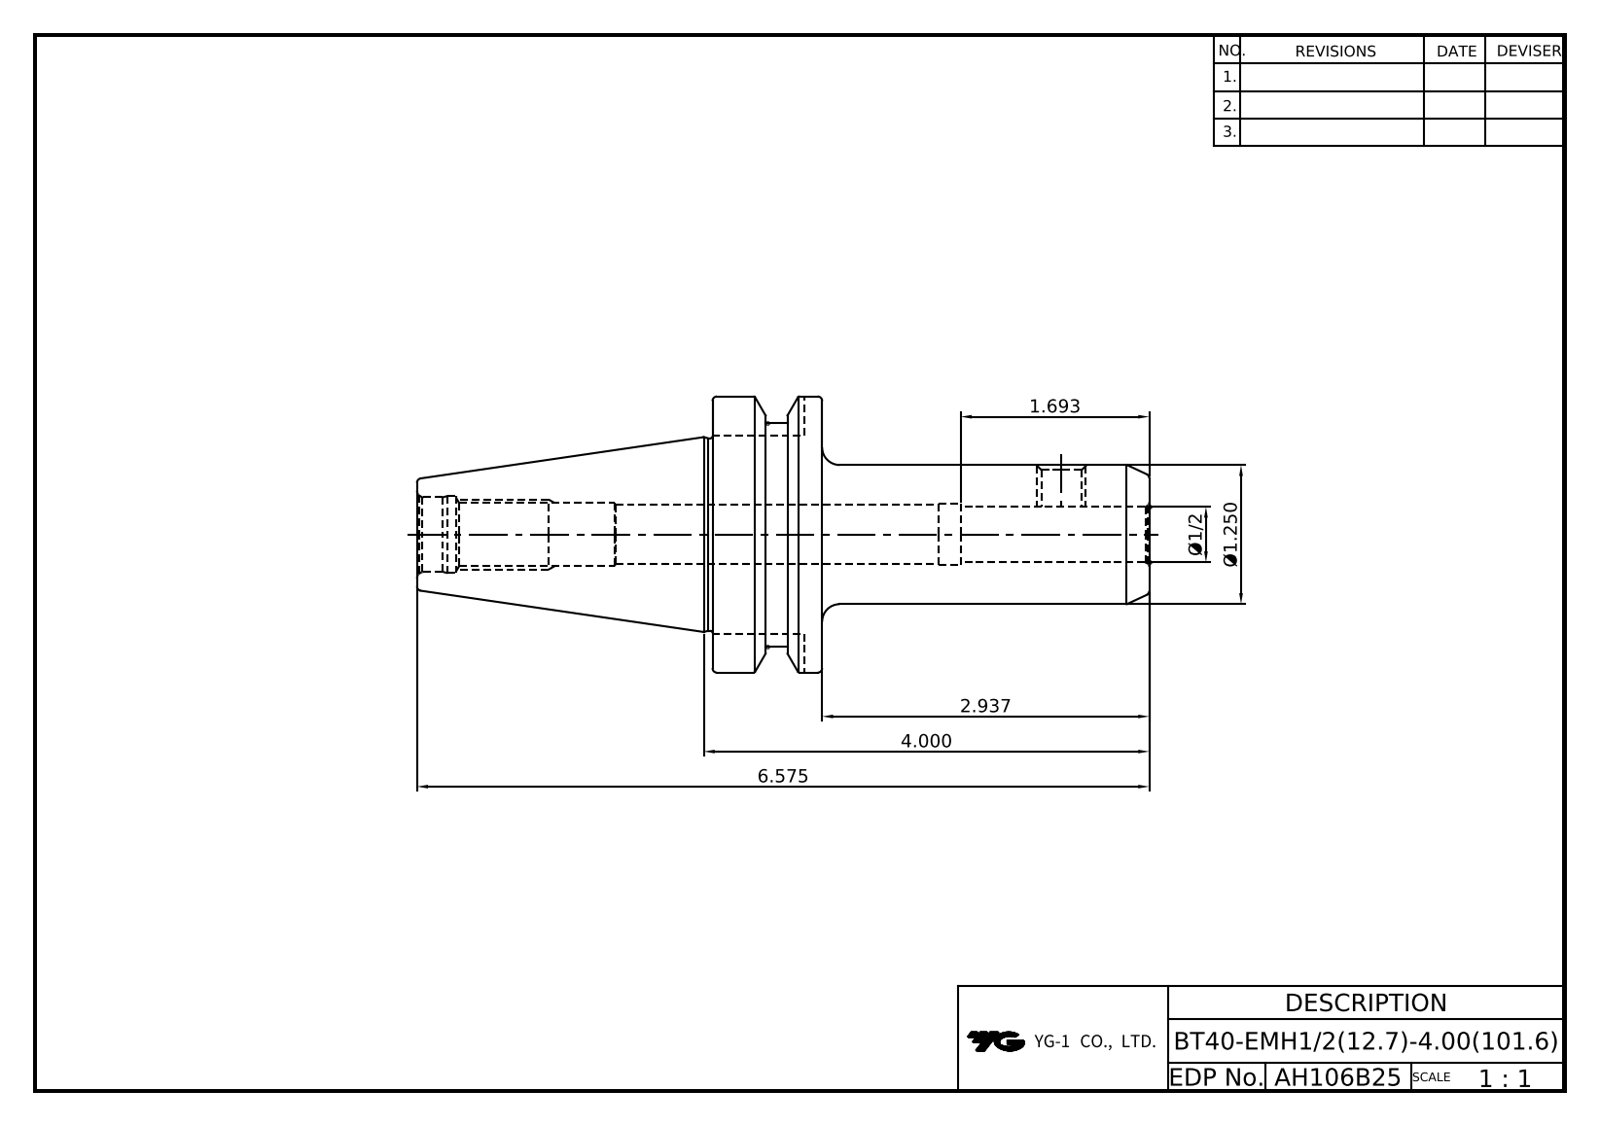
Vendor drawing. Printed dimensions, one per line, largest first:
6.575
4.000
2.937
1.693
Ø1.250
Ø1/2
